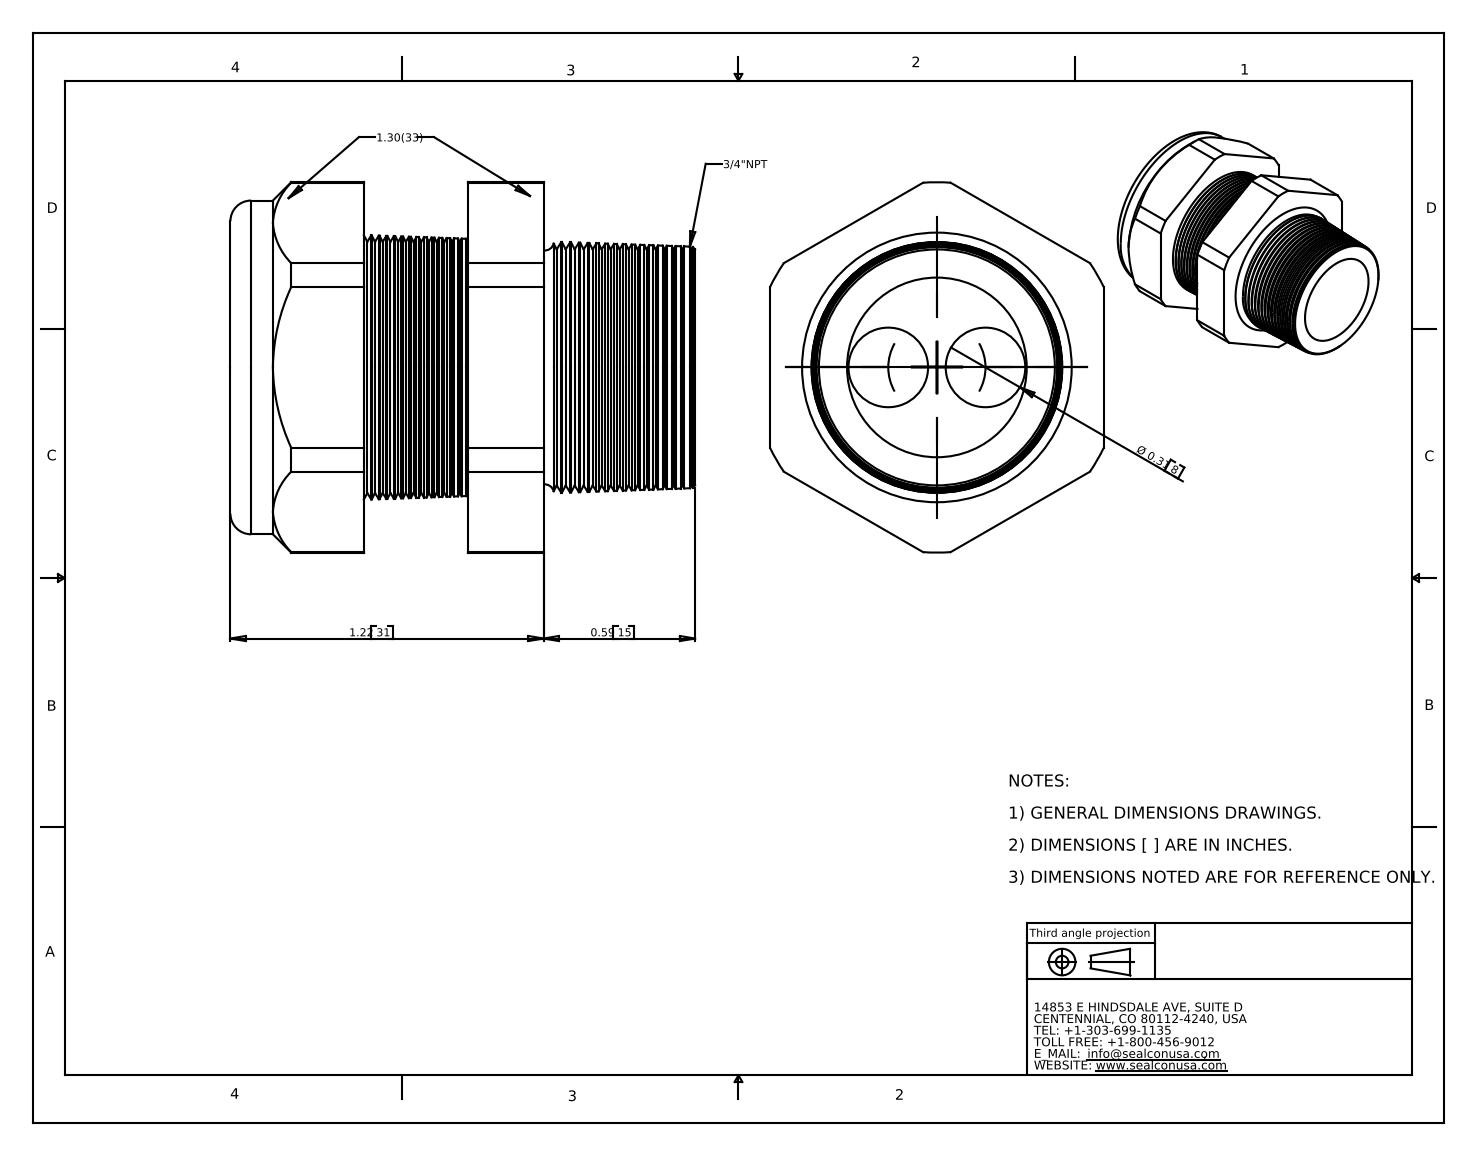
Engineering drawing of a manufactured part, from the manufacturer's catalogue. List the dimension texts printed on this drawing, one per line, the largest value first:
1.22 31
0.59 15
Ø 0.31 8
